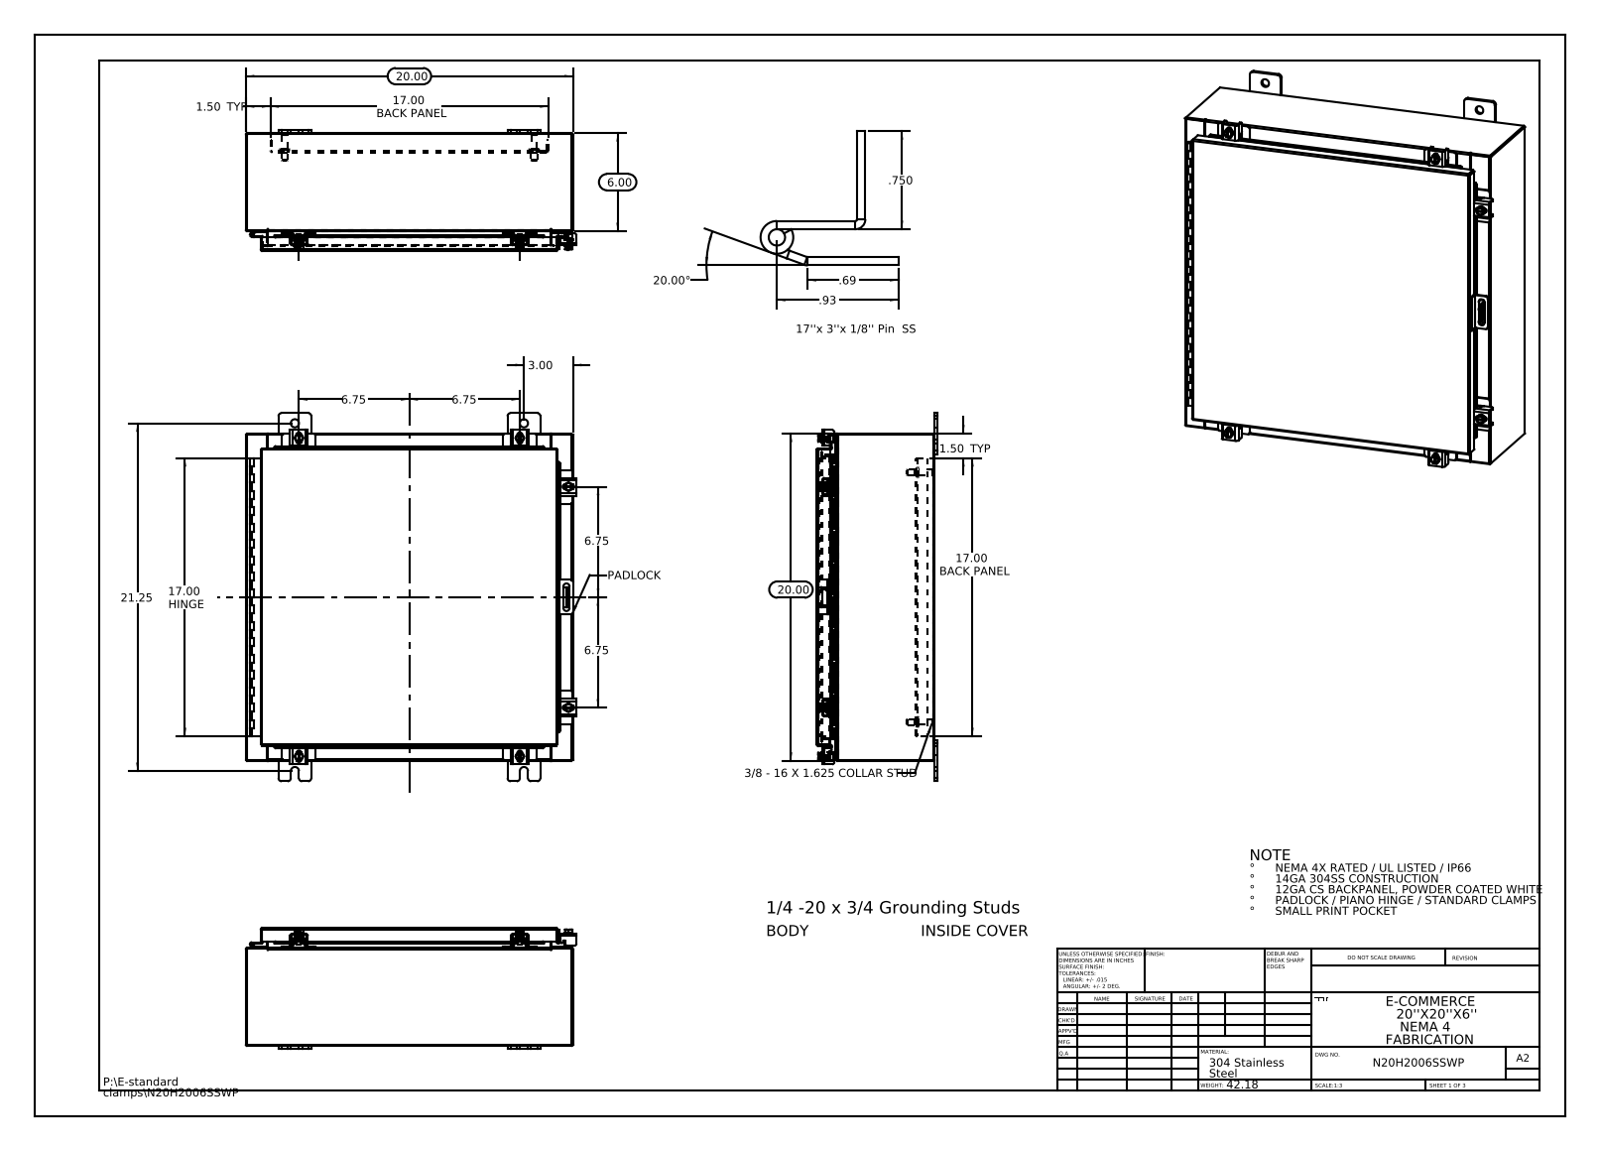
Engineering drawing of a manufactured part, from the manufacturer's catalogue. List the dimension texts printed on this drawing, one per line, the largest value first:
21.25
20.00
20.00
20.00°
17.00 HINGE
17.00 BACK PANEL
17.00 BACK PANEL
6.75
6.75
6.75
6.75
6.00
3.00
1.50 TYP
1.50 TYP
.93
.750
.69
